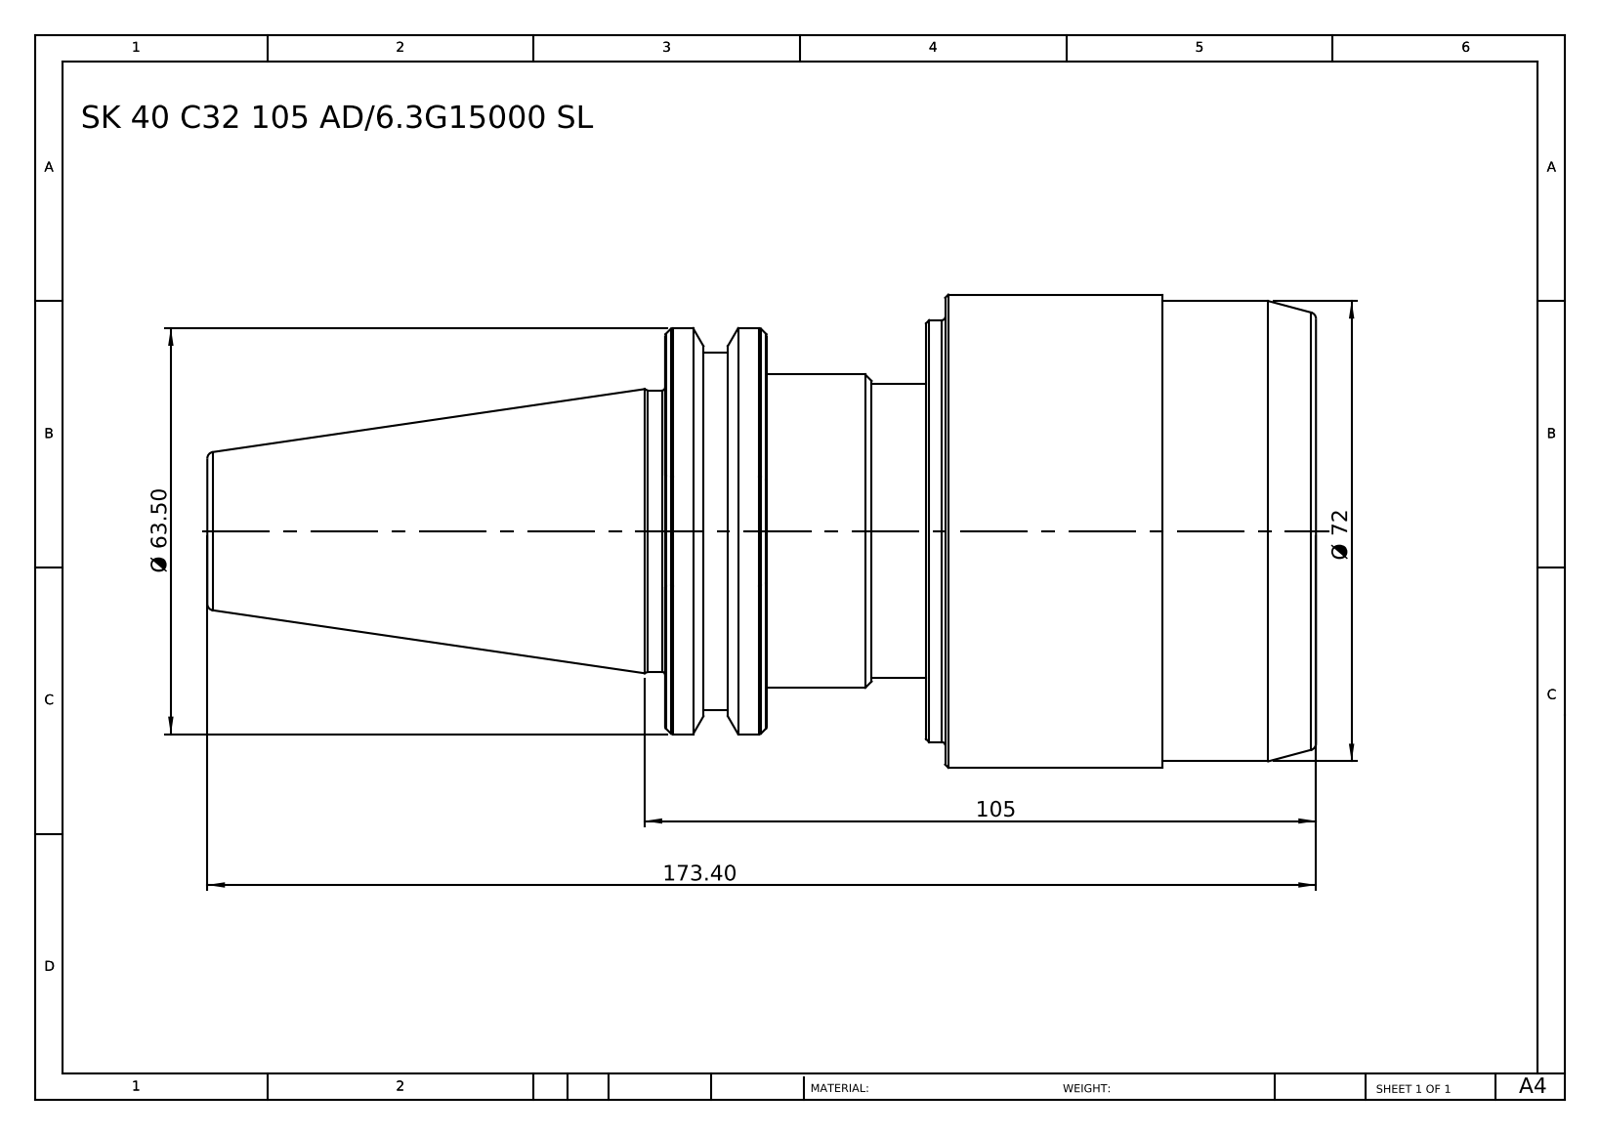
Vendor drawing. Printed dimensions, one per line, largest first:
173.40
105
Ø 72
Ø 63.50
